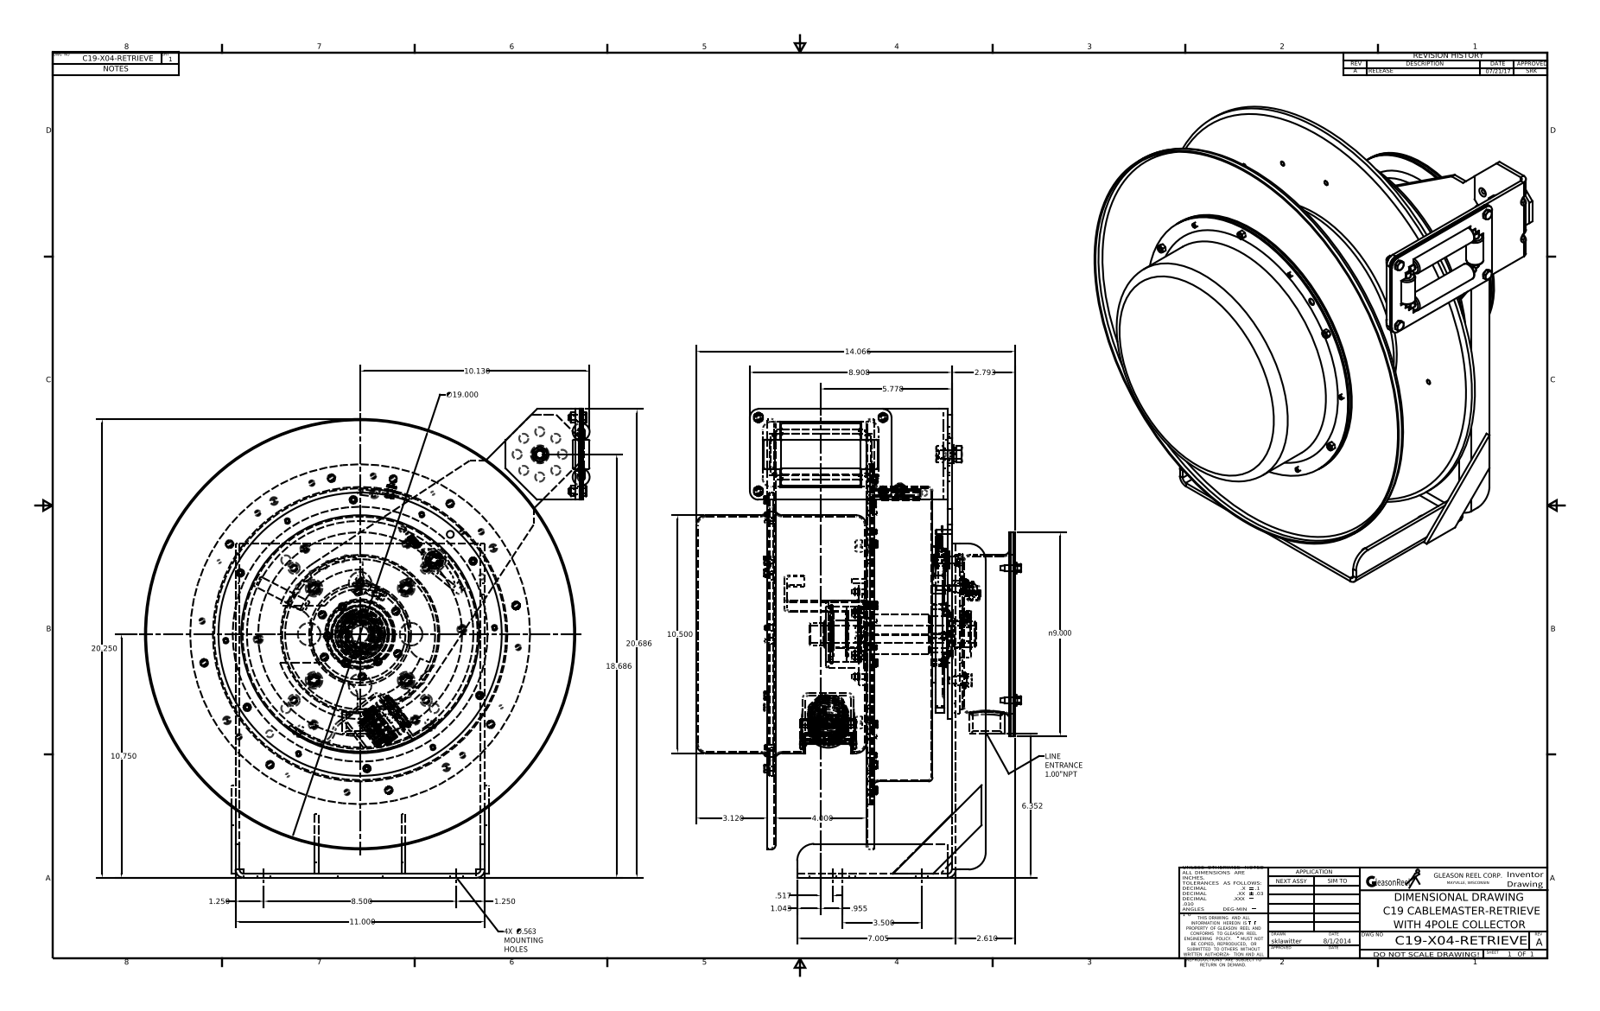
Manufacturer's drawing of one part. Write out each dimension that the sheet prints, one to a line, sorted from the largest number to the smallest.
20.686
20.250
∅19.000
18.686
14.066
11.000
10.750
10.500
10.130
n9.000
8.908
8.500
7.005
6.352
5.778
4.000
3.500
3.120
2.793
2.610
1.250
1.250
1.043
.955
.517
